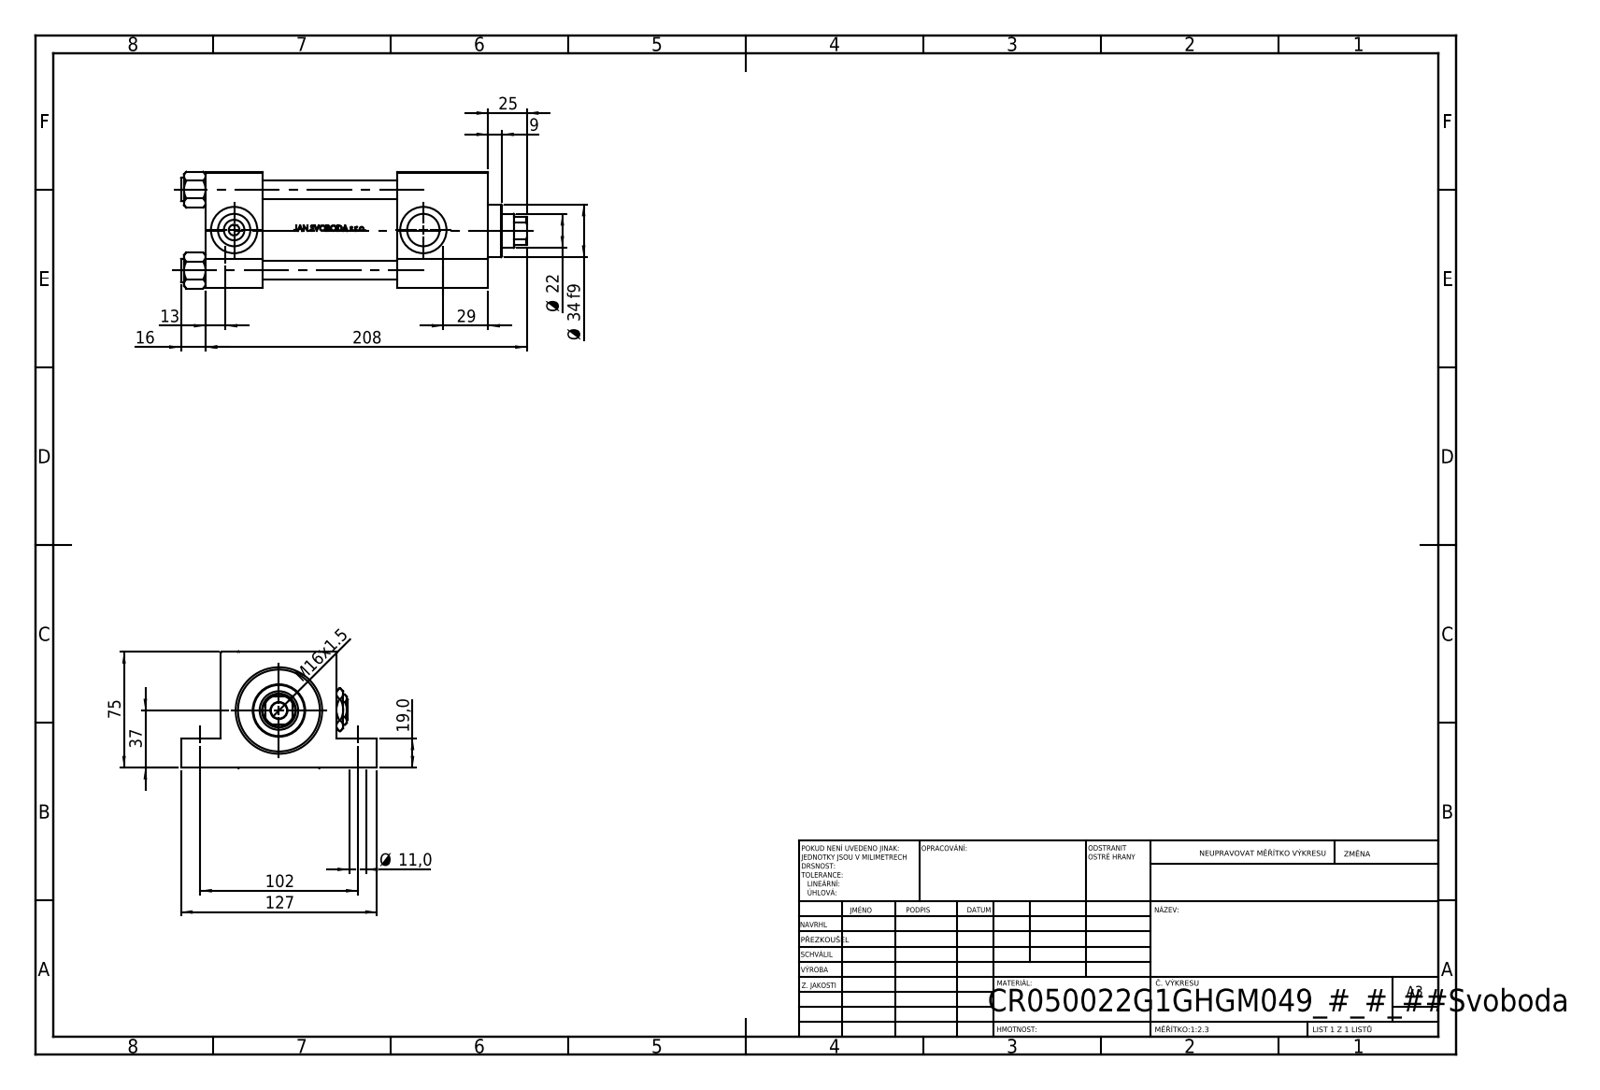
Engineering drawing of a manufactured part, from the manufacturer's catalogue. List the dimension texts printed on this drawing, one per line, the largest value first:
208
127
102
75
37
Ø 34 f9
29
25
Ø 22
19,0
16
M16x1.5
13
Ø 11,0
9
